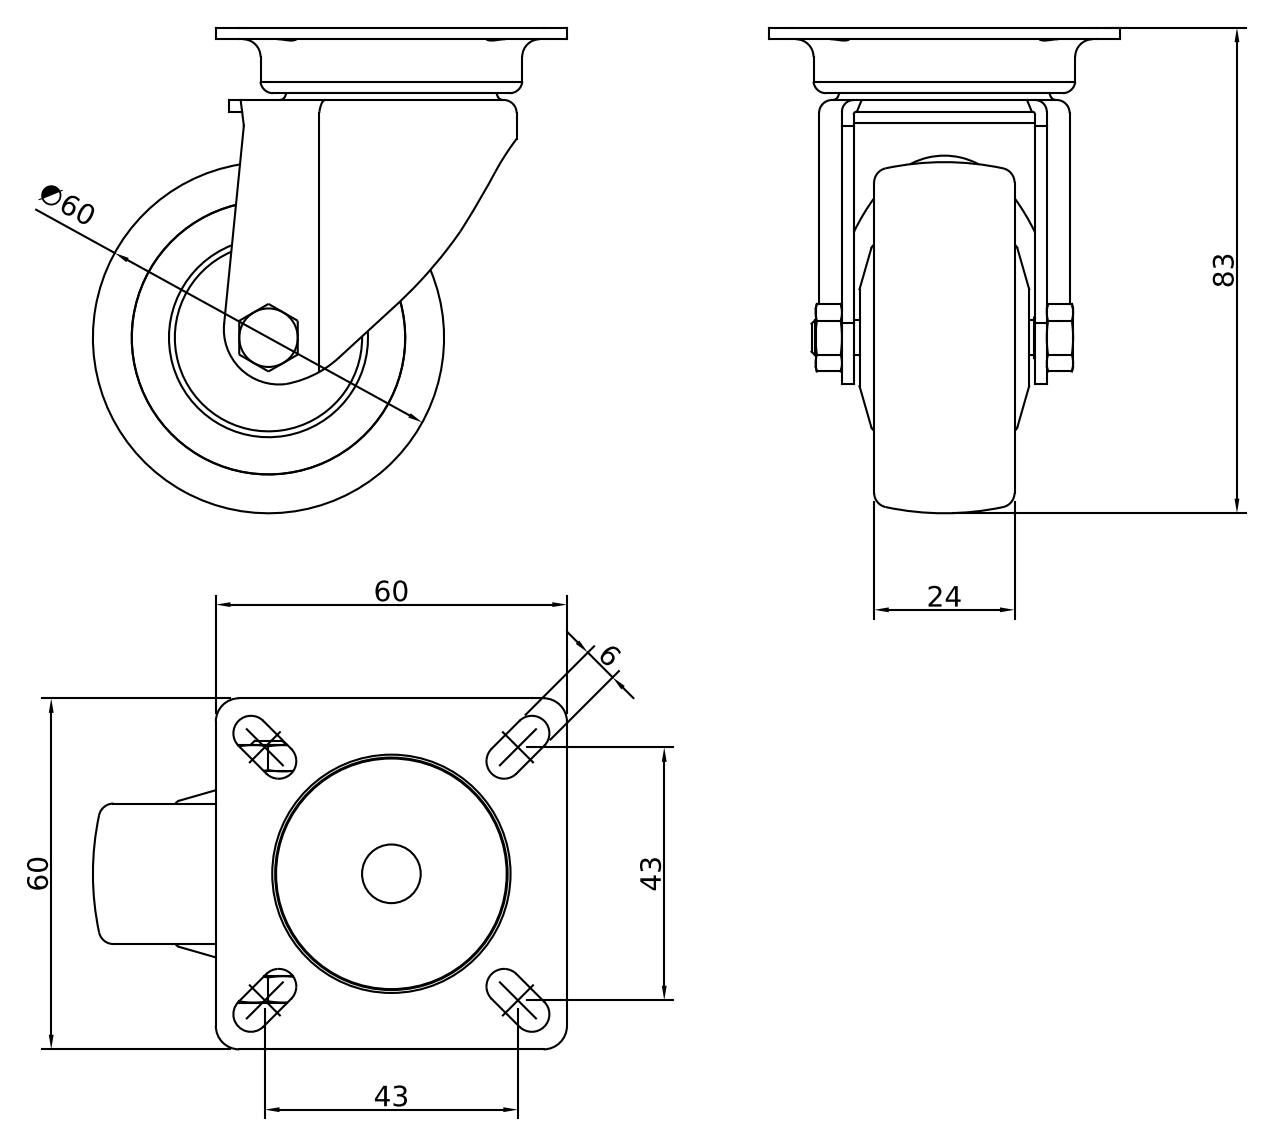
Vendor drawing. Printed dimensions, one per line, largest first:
83
∅60
60
60
43
43
24
6
